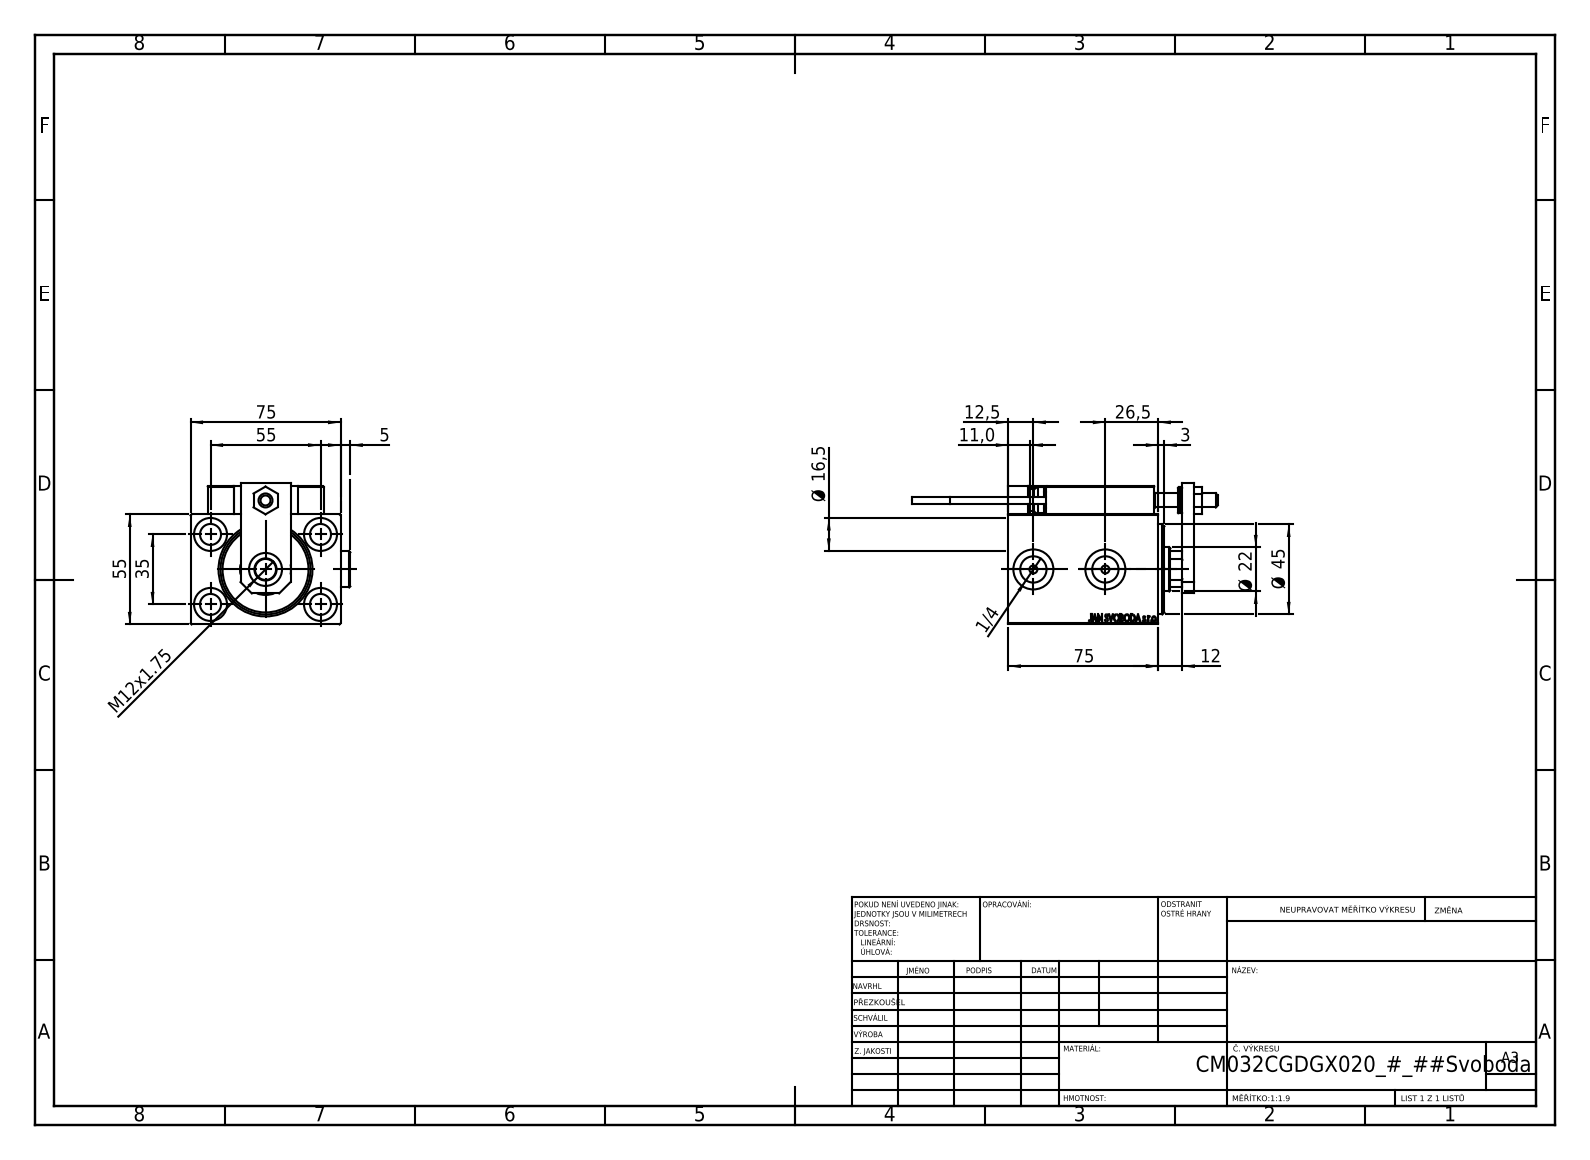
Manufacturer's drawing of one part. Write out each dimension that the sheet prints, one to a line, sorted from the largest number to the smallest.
75
75
55
55
Ø 45
35
26,5
Ø 22
Ø 16,5
12,5
M12x1.75
12
11,0
5
3
1/4
